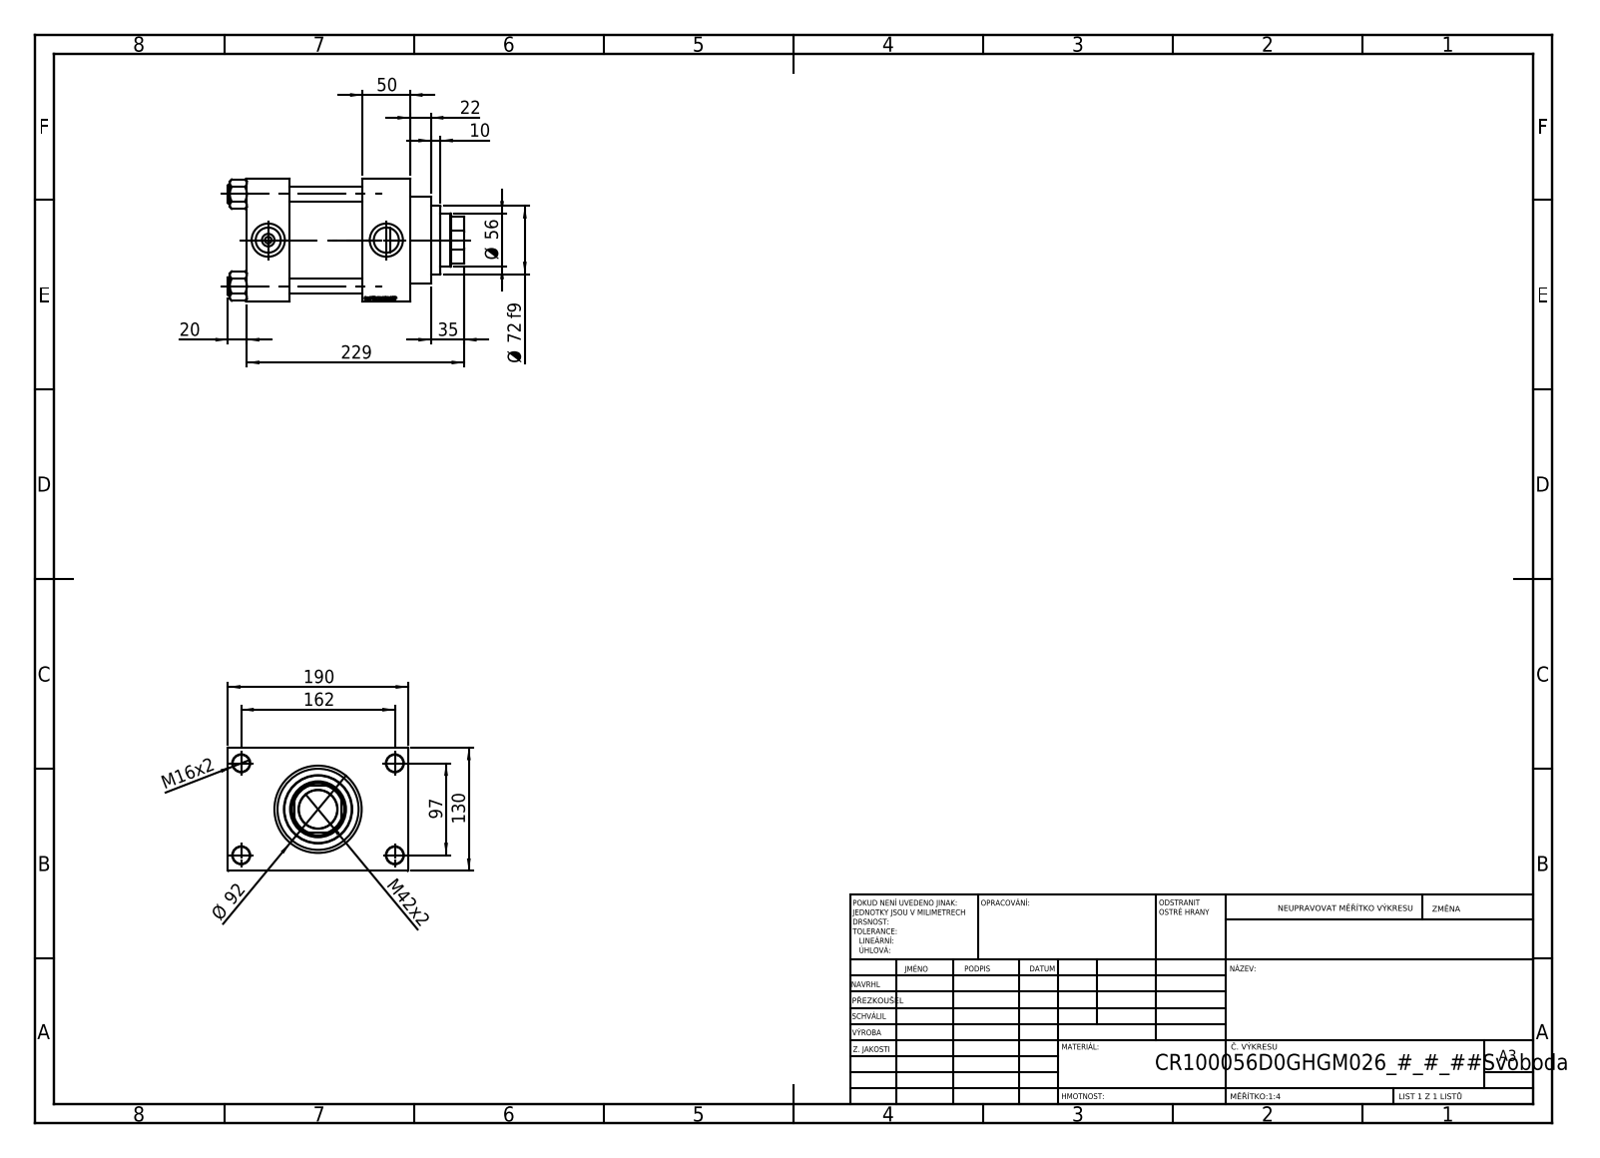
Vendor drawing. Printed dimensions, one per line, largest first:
229
190
162
130
97
Ø 92
Ø 72 f9
Ø 56
50
M42x2
35
22
20
M16x2
10
